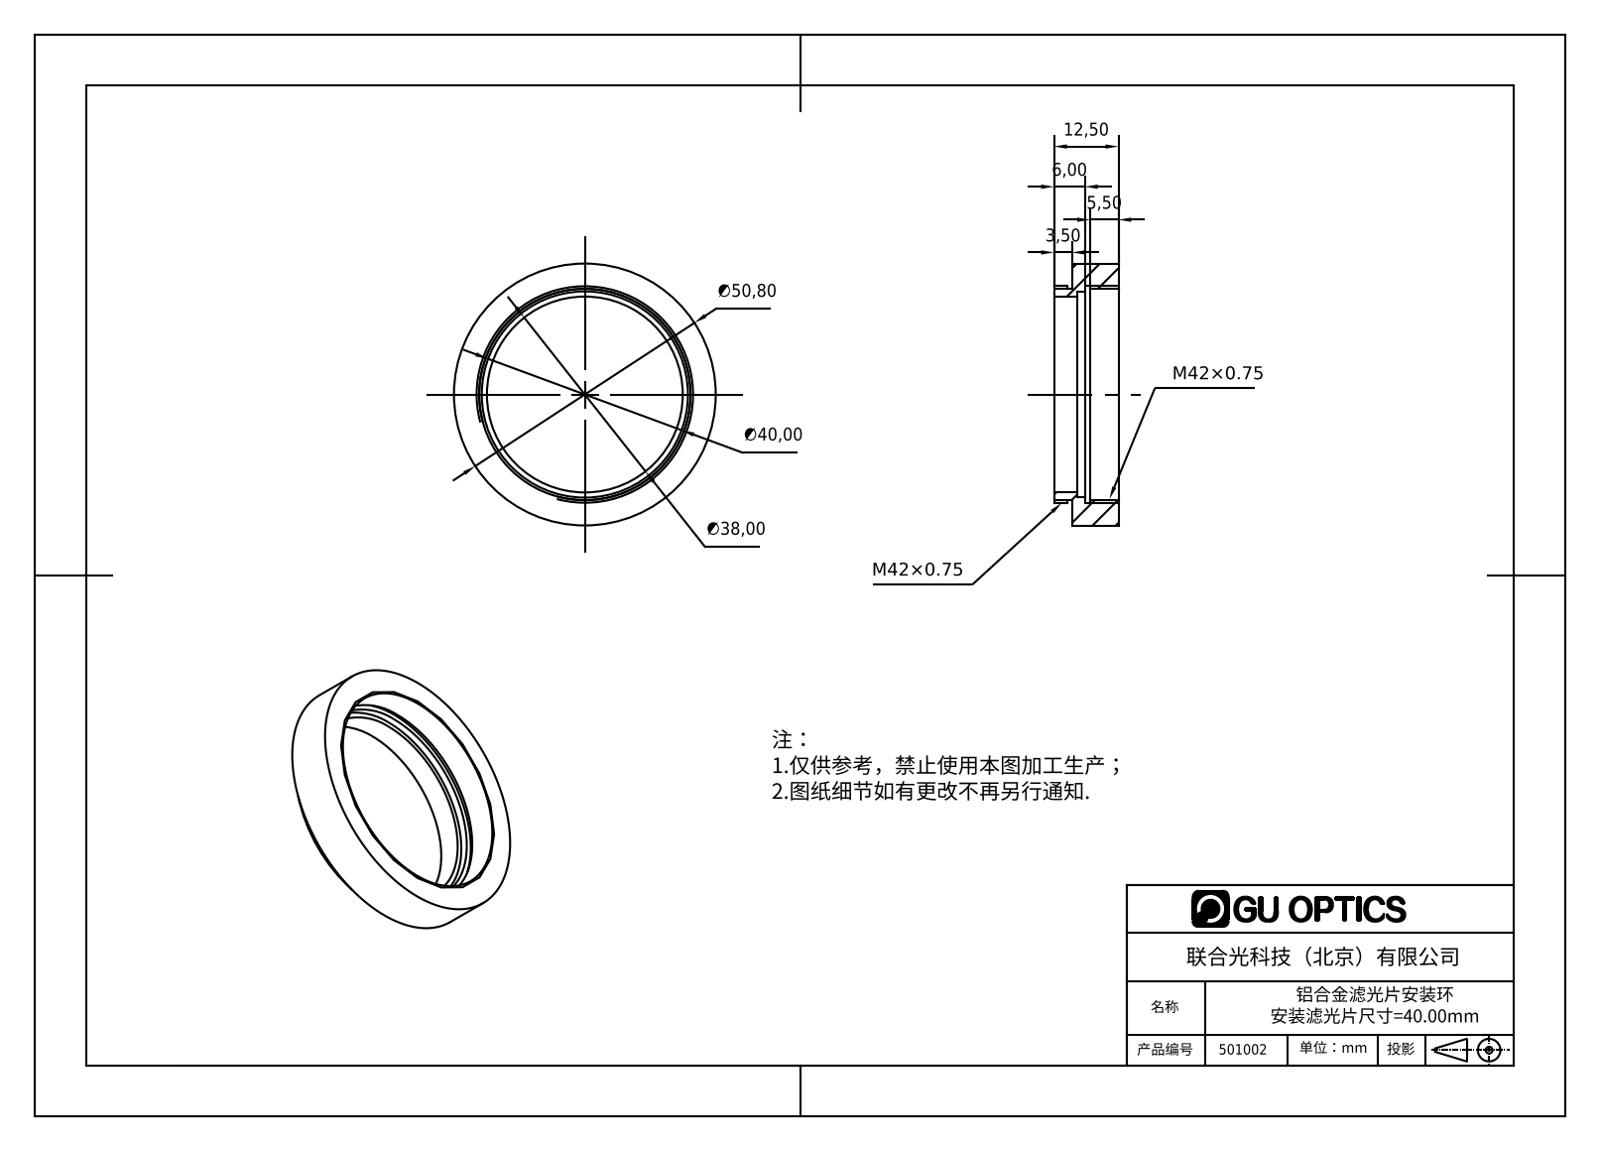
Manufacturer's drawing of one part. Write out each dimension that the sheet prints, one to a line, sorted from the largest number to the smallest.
∅50,80
∅40,00
∅38,00
12,50
6,00
5,50
3,50
